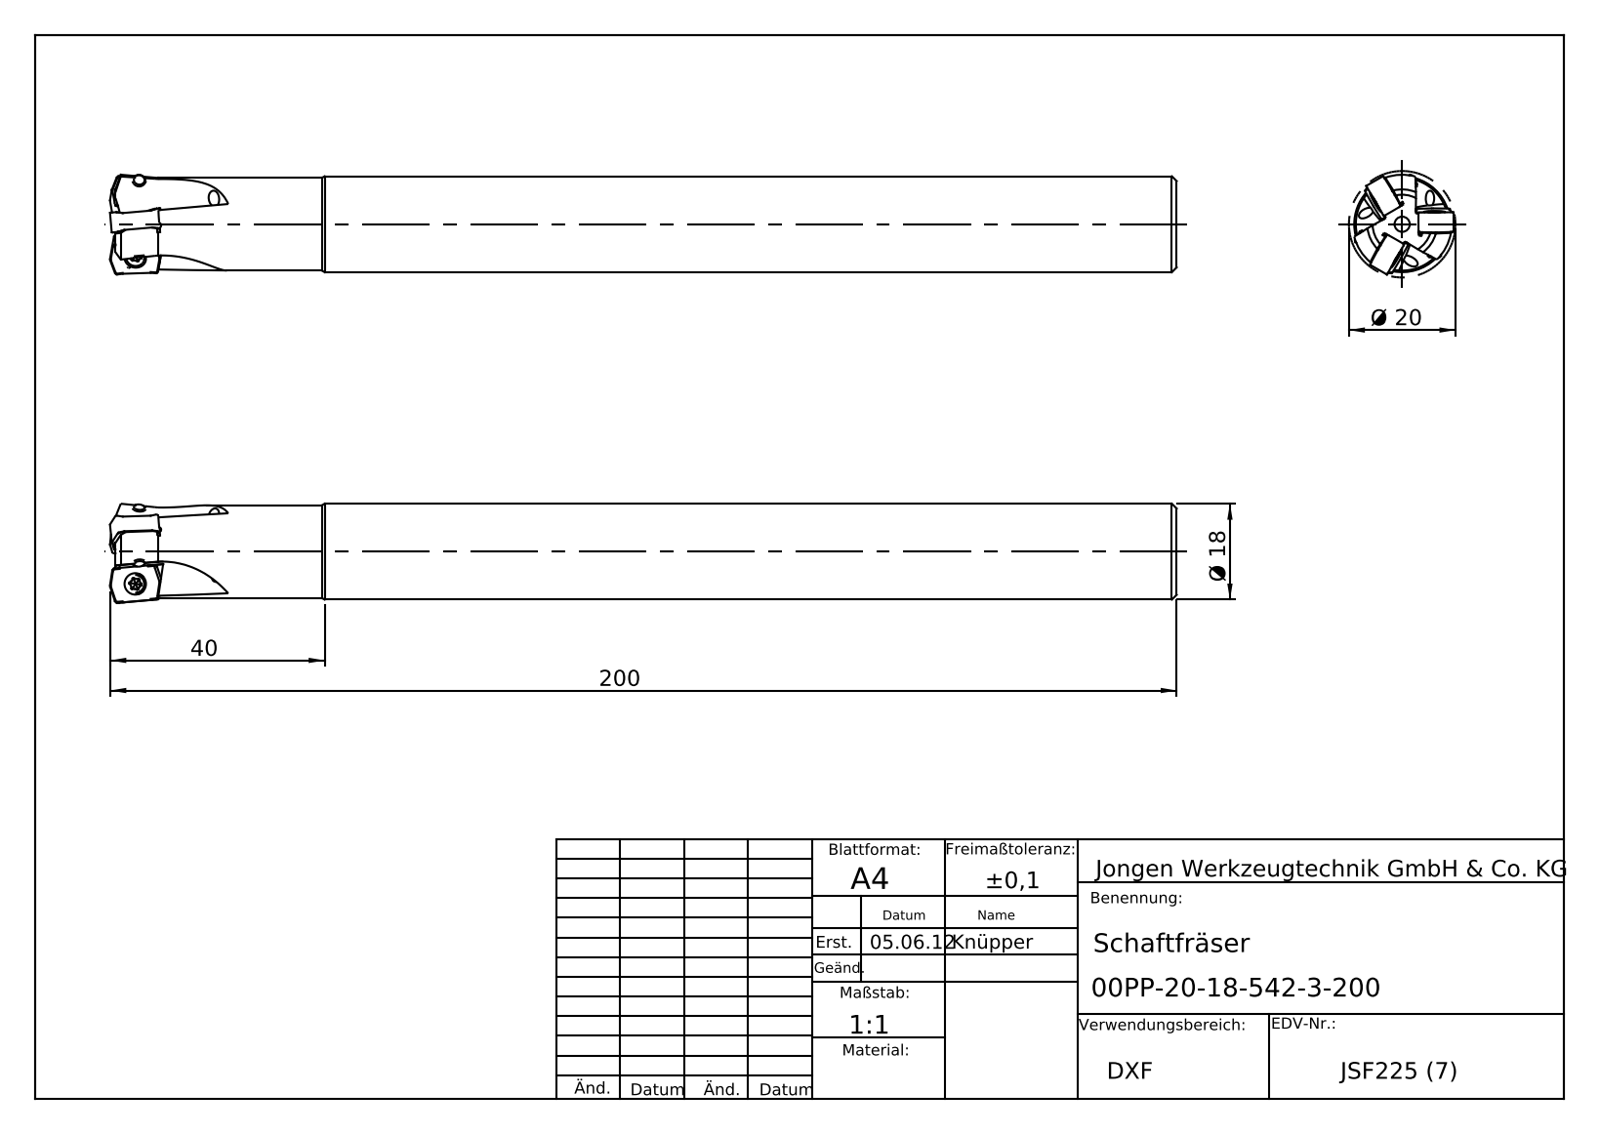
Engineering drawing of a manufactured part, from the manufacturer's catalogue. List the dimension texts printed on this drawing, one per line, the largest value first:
200
40
Ø 20
Ø 18
